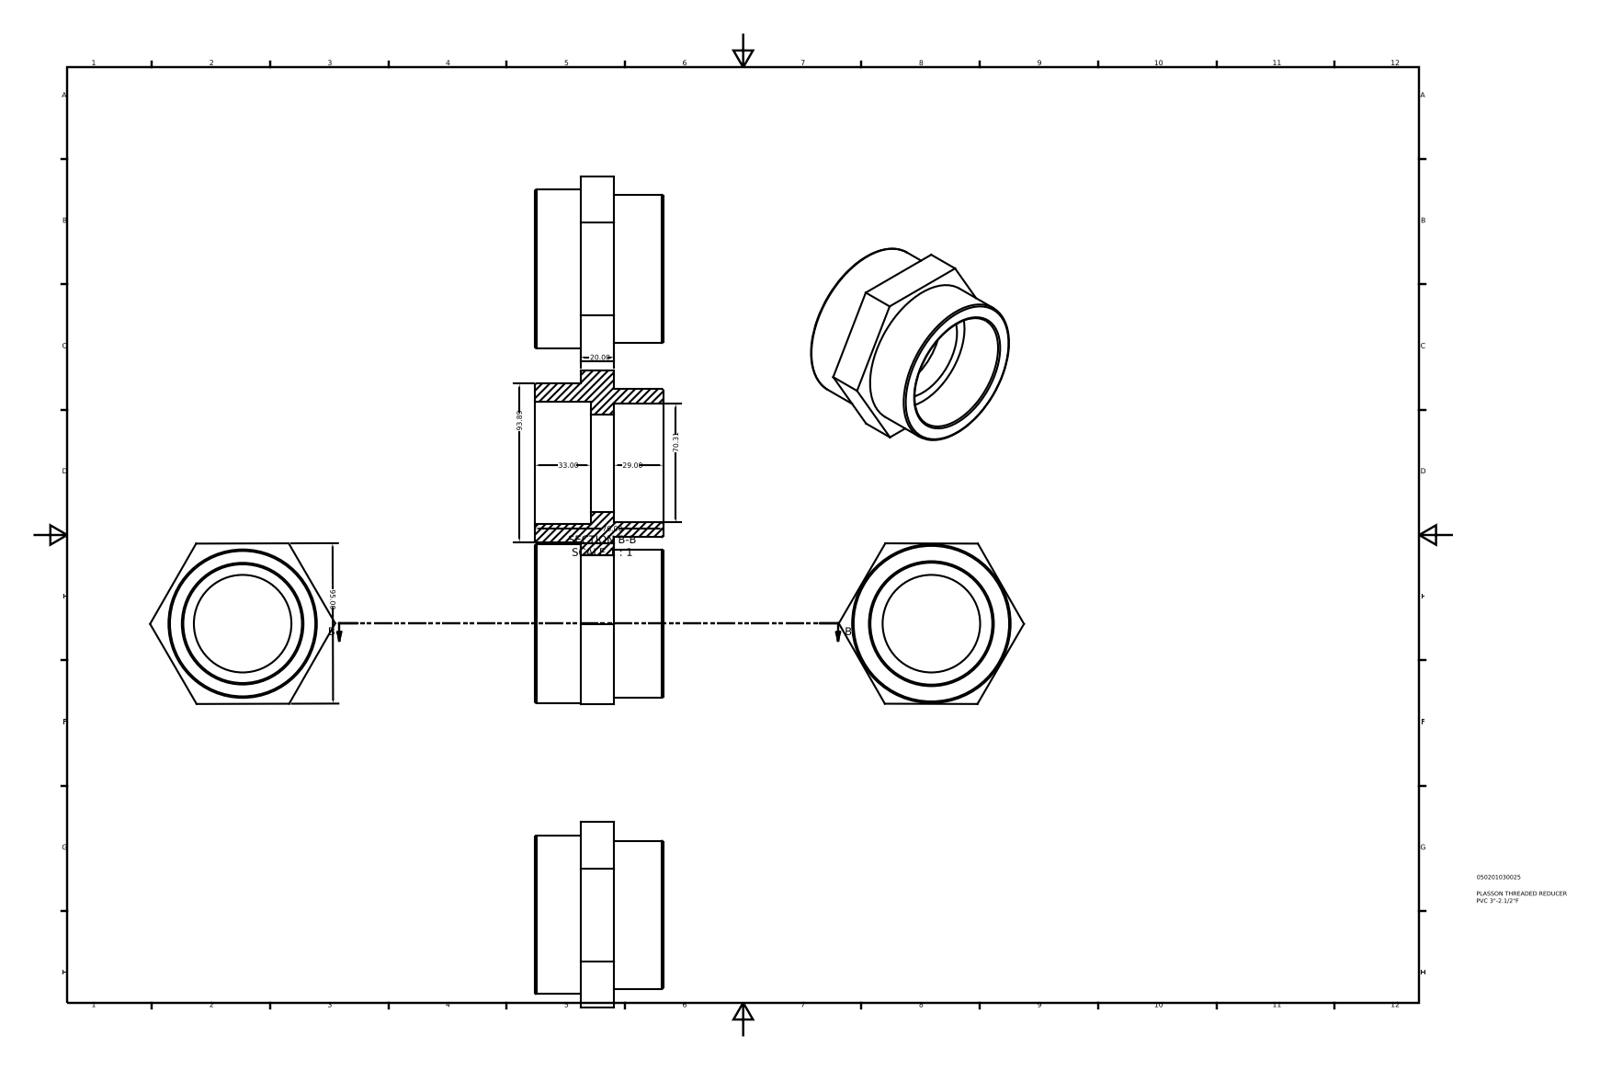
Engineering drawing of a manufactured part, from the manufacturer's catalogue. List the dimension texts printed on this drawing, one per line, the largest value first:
95.00
93.89
76.00
70.31
33.00
29.00
20.00
